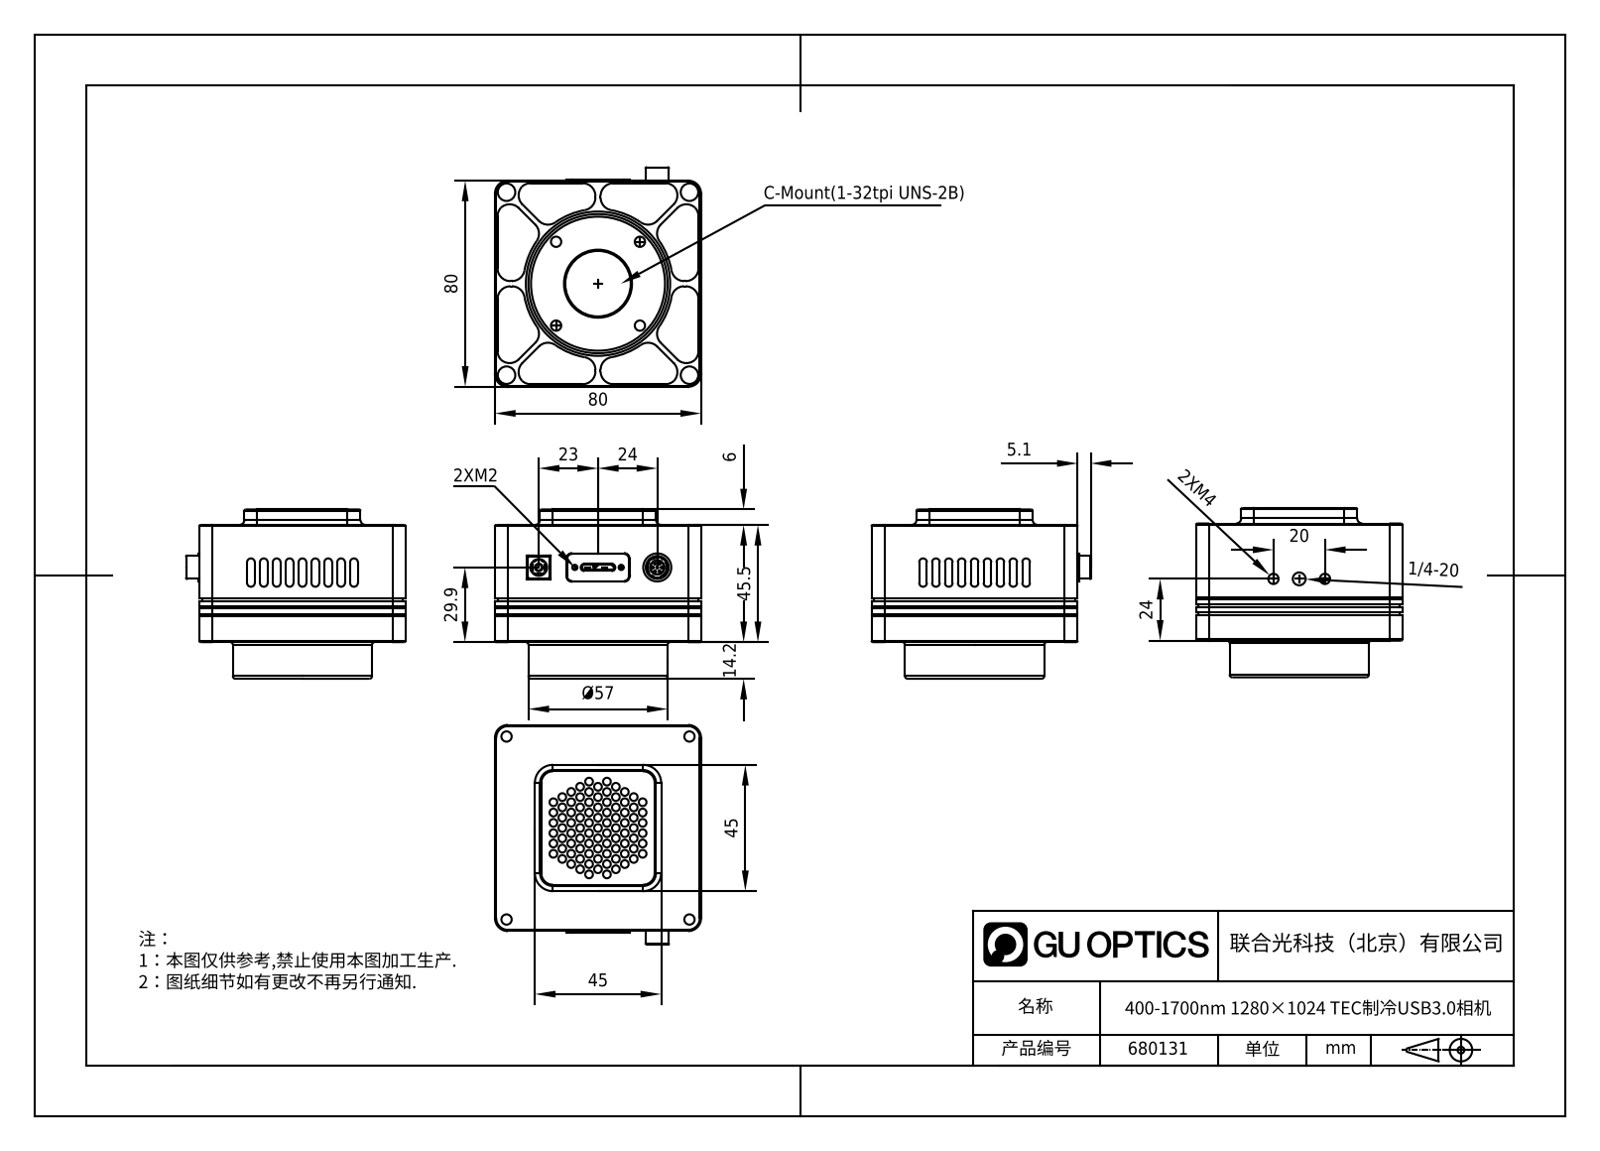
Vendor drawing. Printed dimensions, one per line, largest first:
80
80
Ø57
45.5
45
45
29.9
24
24
23
20
14.2
6
5.1
2XM4
1/4-20
